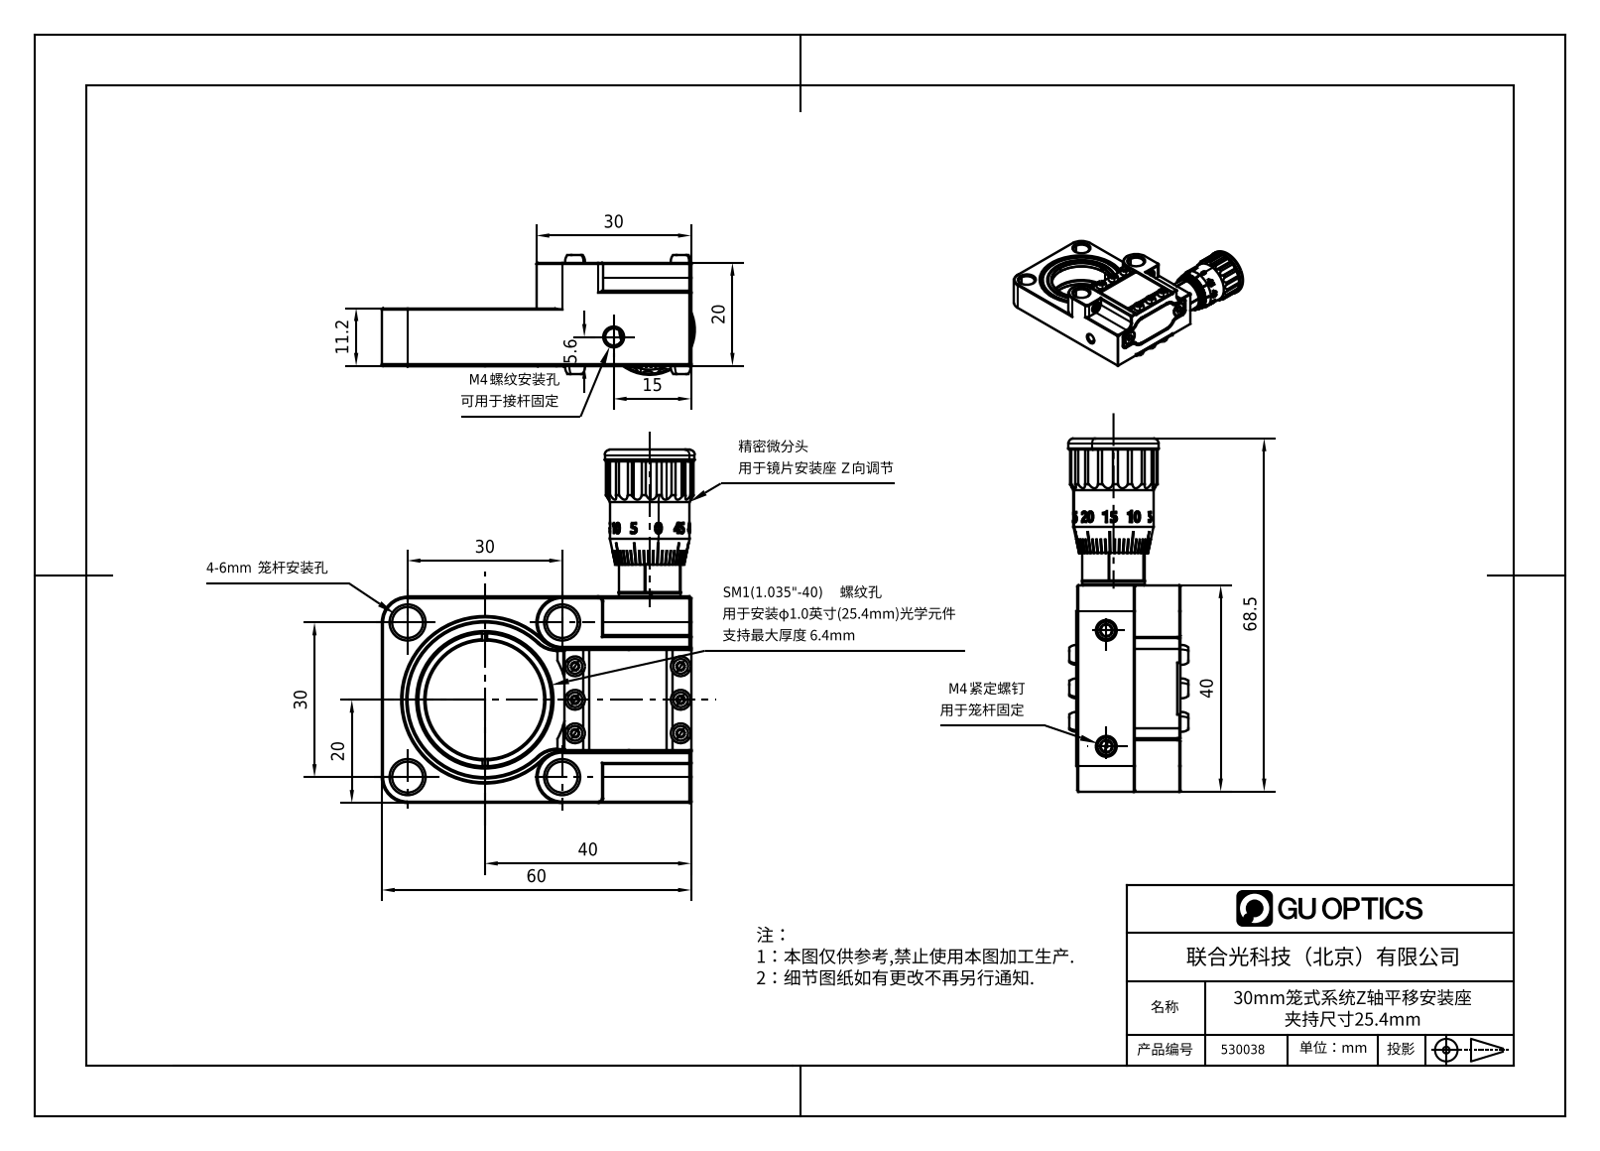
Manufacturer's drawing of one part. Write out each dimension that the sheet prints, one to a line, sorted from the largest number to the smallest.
68.5
60
40
40
30
30
30
20
20
15
11.2
5.6
